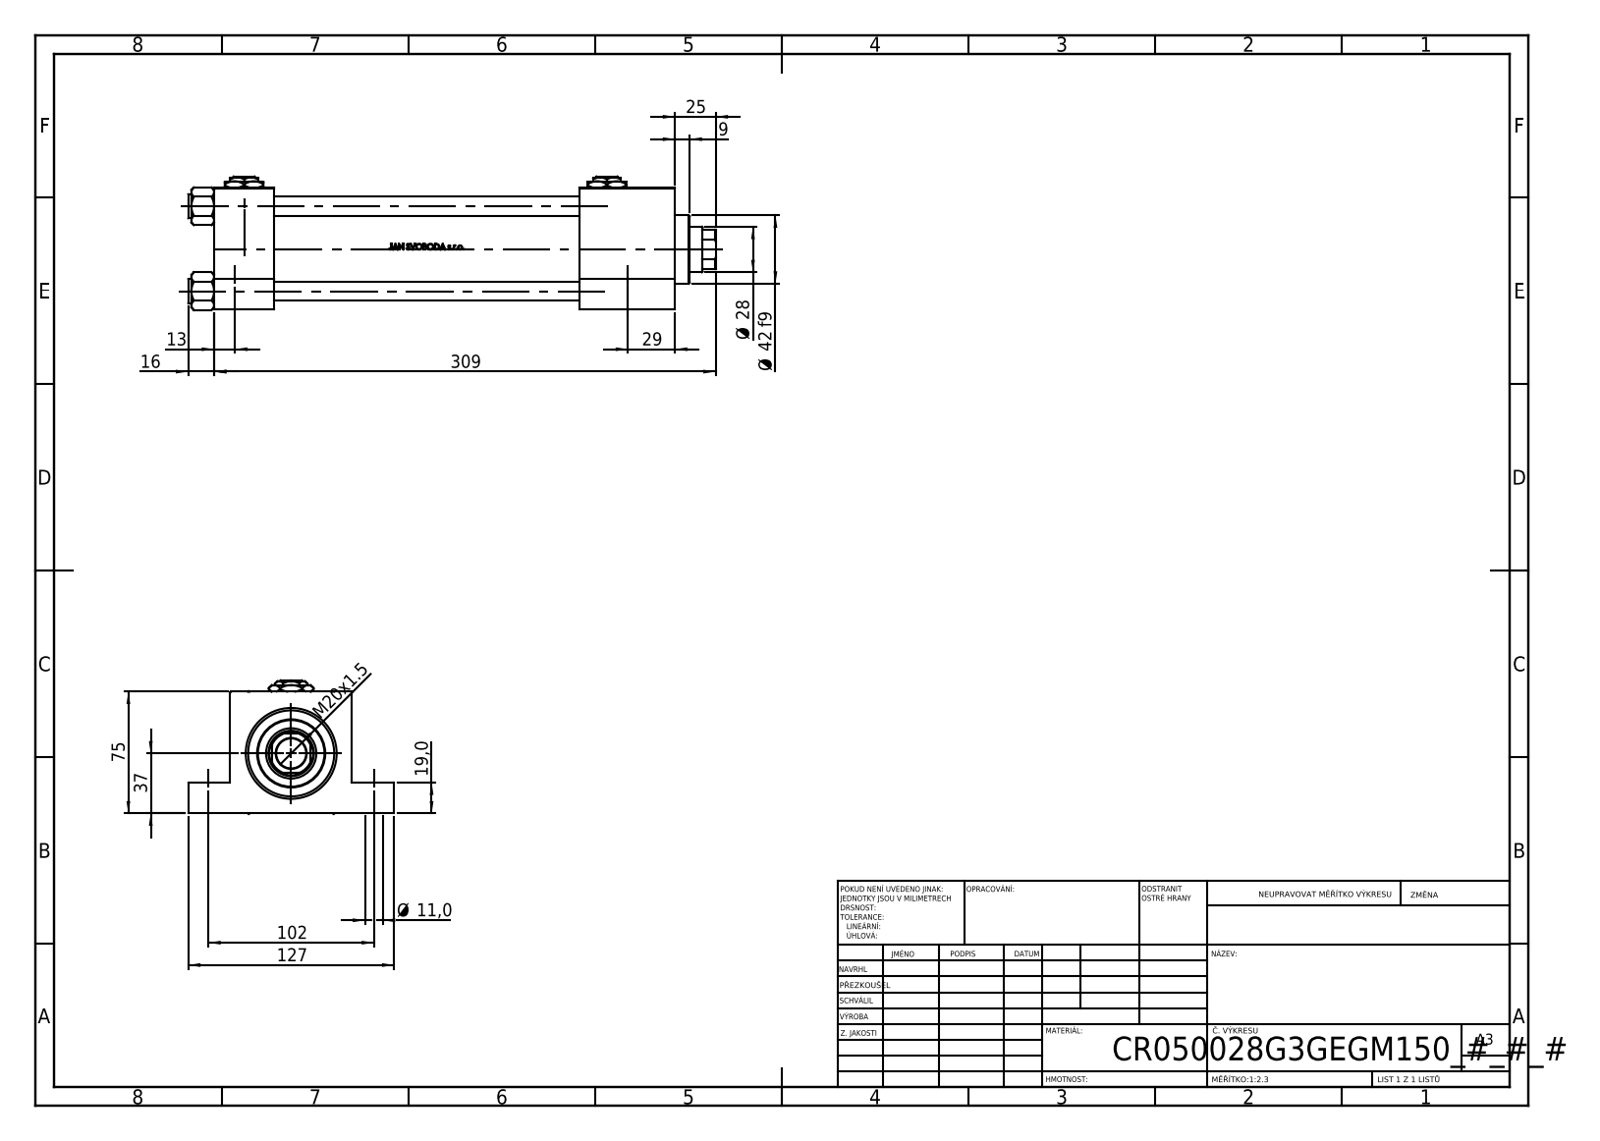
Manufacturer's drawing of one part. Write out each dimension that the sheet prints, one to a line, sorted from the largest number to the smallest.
309
127
102
75
Ø 42 f9
37
29
Ø 28
25
M20x1.5
19,0
16
13
Ø 11,0
9
